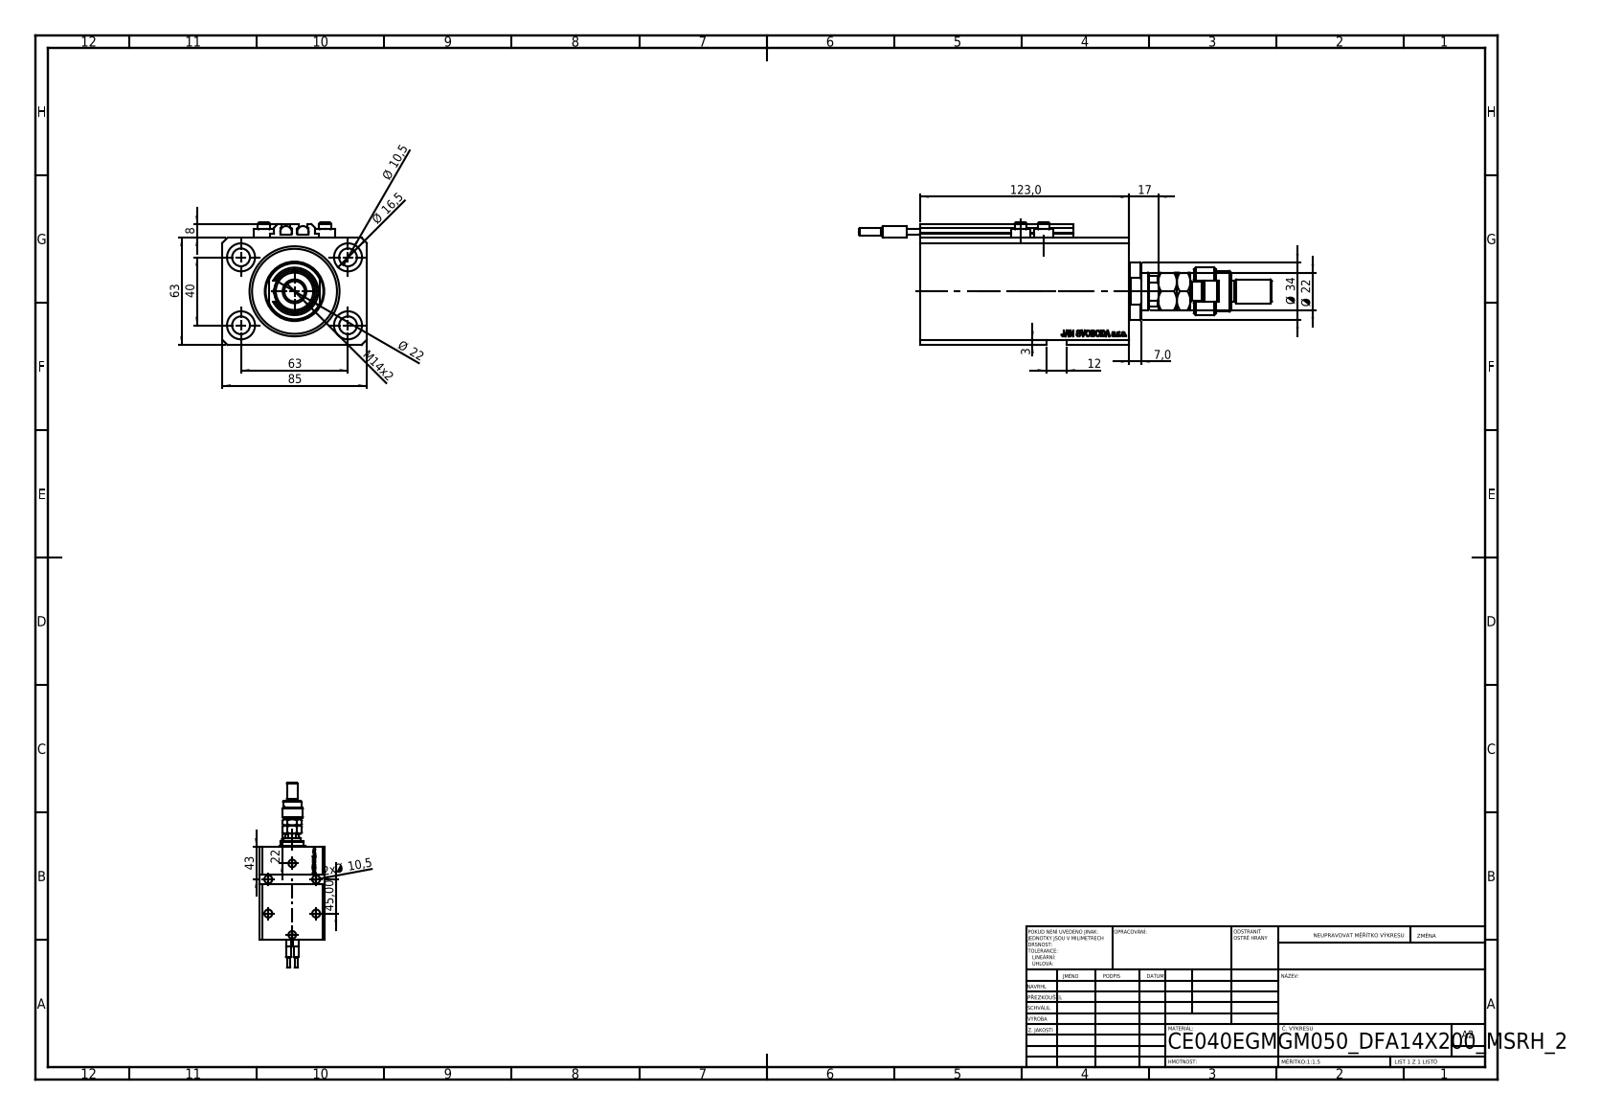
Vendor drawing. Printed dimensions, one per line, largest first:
123,0
85
63
63
45,00
43
40
Ø 34
Ø 22
Ø 22
22
17
Ø 16,5
M14x2
12
Ø 10,5
2x Ø 10,5
8
7,0
3
